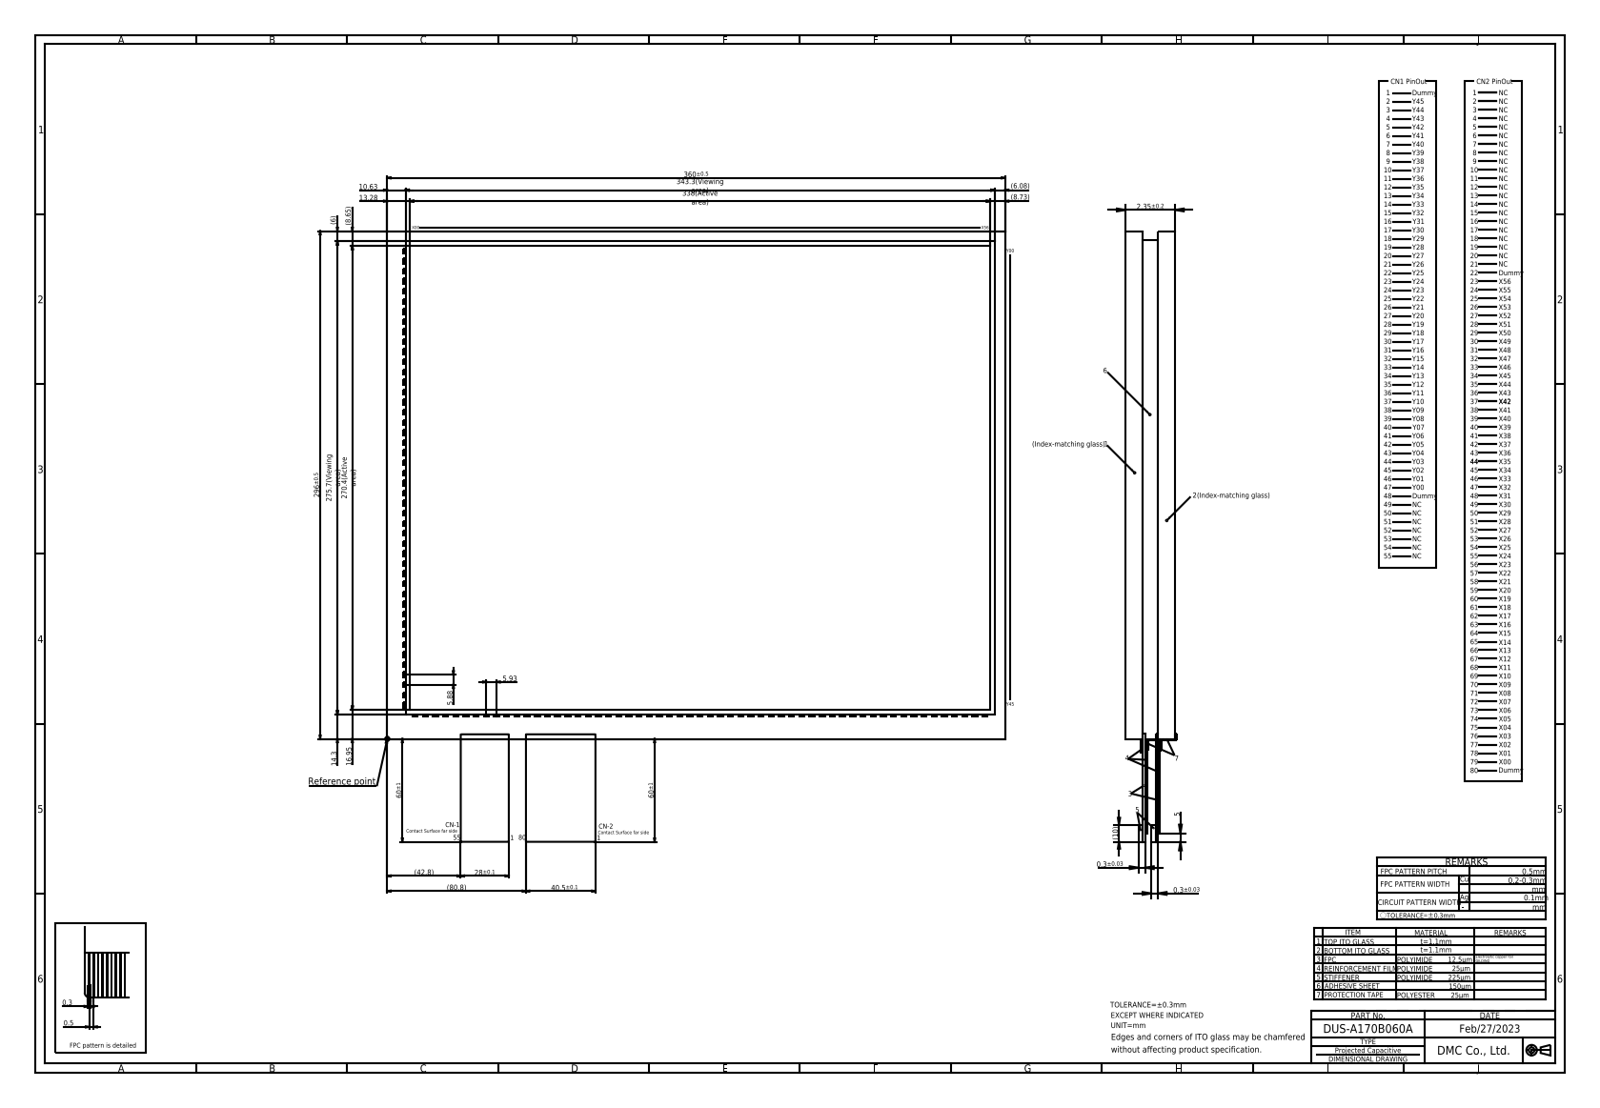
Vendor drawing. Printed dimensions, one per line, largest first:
360±0.5
343.3(Viewing area)
338(Active area)
296±0.5
275.7(Viewing area)
270.4(Active area)
(80.8)
60±1
60±1
(42.8)
40.5±0.1
28±0.1
16.95
14.3
13.28
10.63
(10)
(8.73)
(8.65)
(6.08)
(6)
5.93
5.88
5
2.35±0.2
0.5
0.3
0.3±0.03
0.3±0.03
